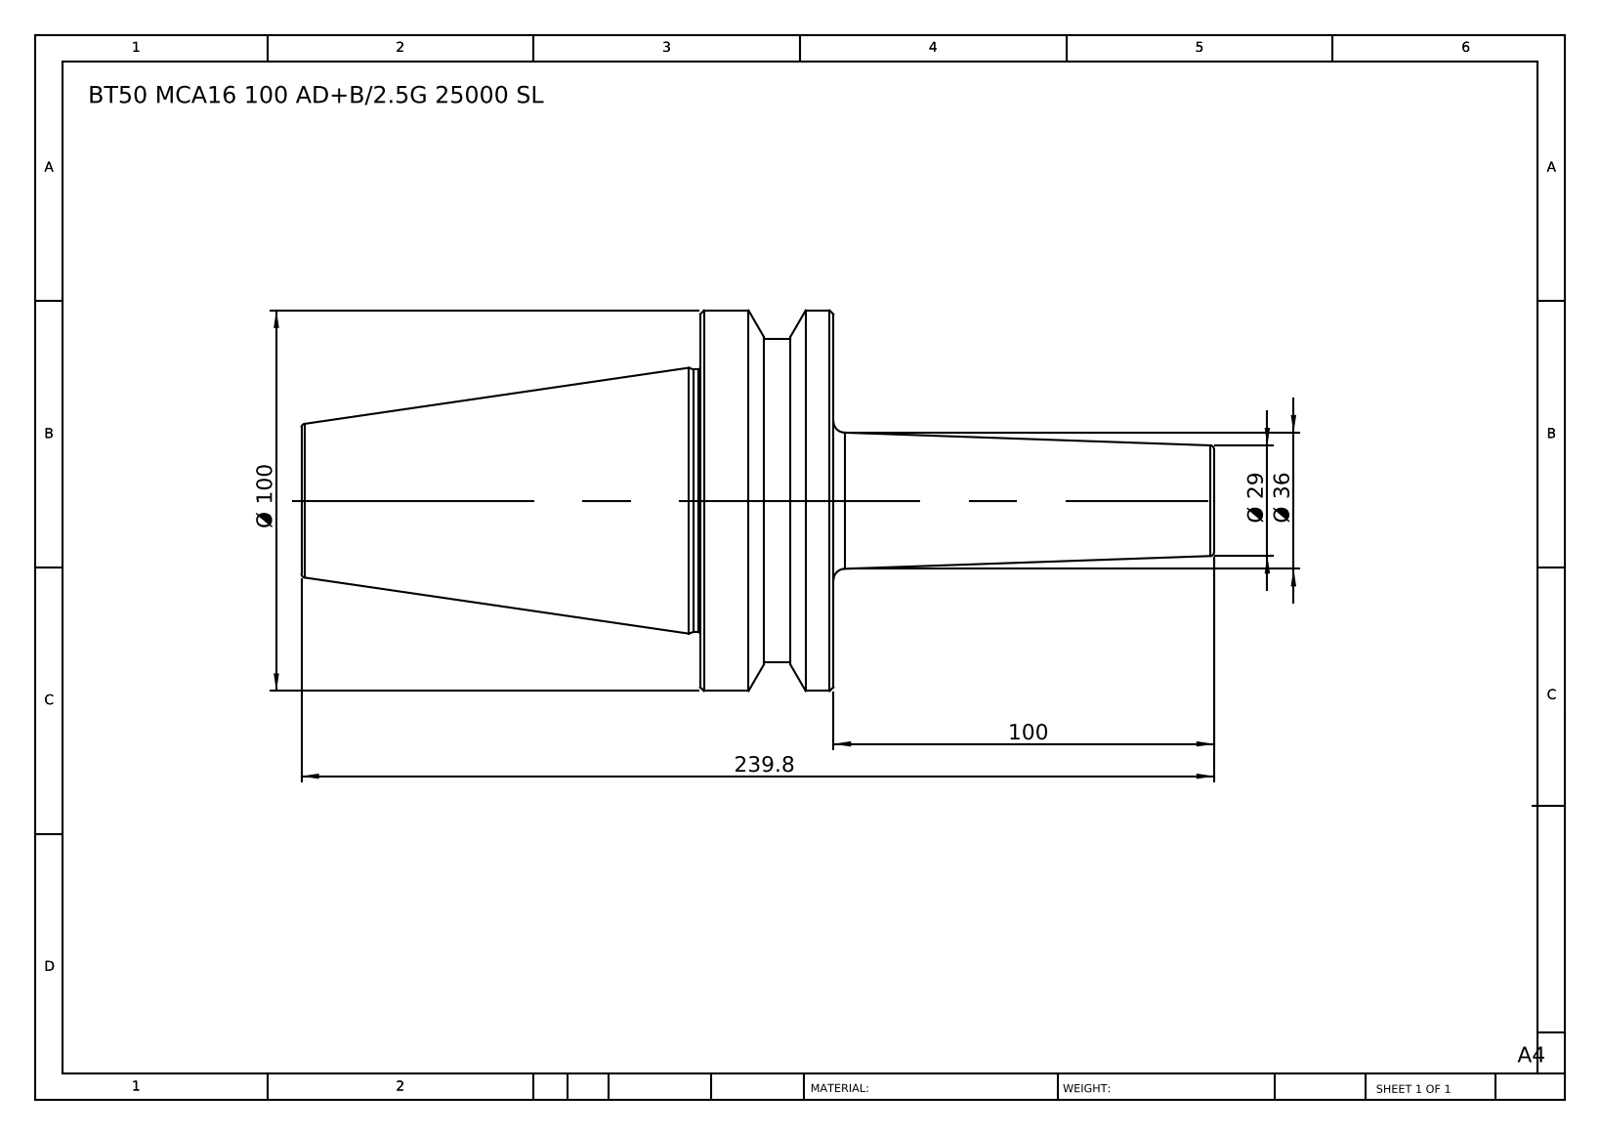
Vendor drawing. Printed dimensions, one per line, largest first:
239.8
Ø 100
100
Ø 36
Ø 29
